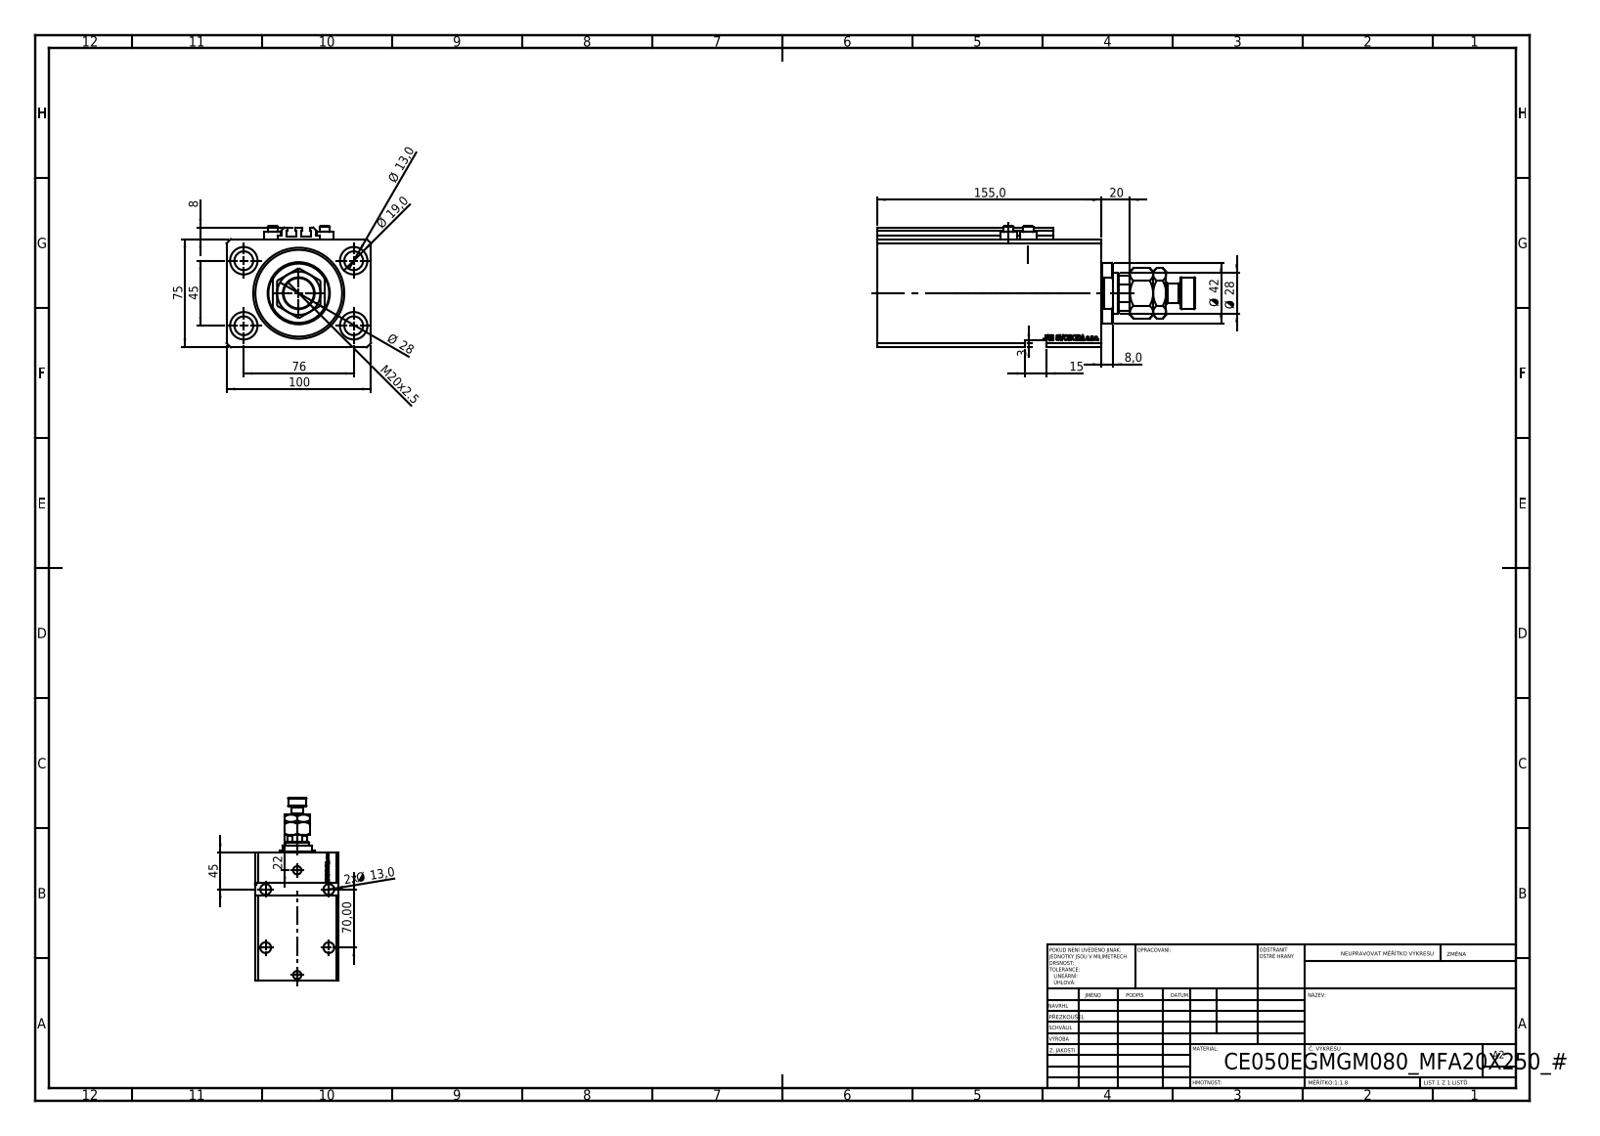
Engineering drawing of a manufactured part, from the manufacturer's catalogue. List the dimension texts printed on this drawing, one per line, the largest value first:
155,0
100
76
75
70,00
45
45
Ø 42
Ø 28
Ø 28
22
M20x2.5
20
Ø 19,0
15
Ø 13,0
2x Ø 13,0
8
8,0
3
